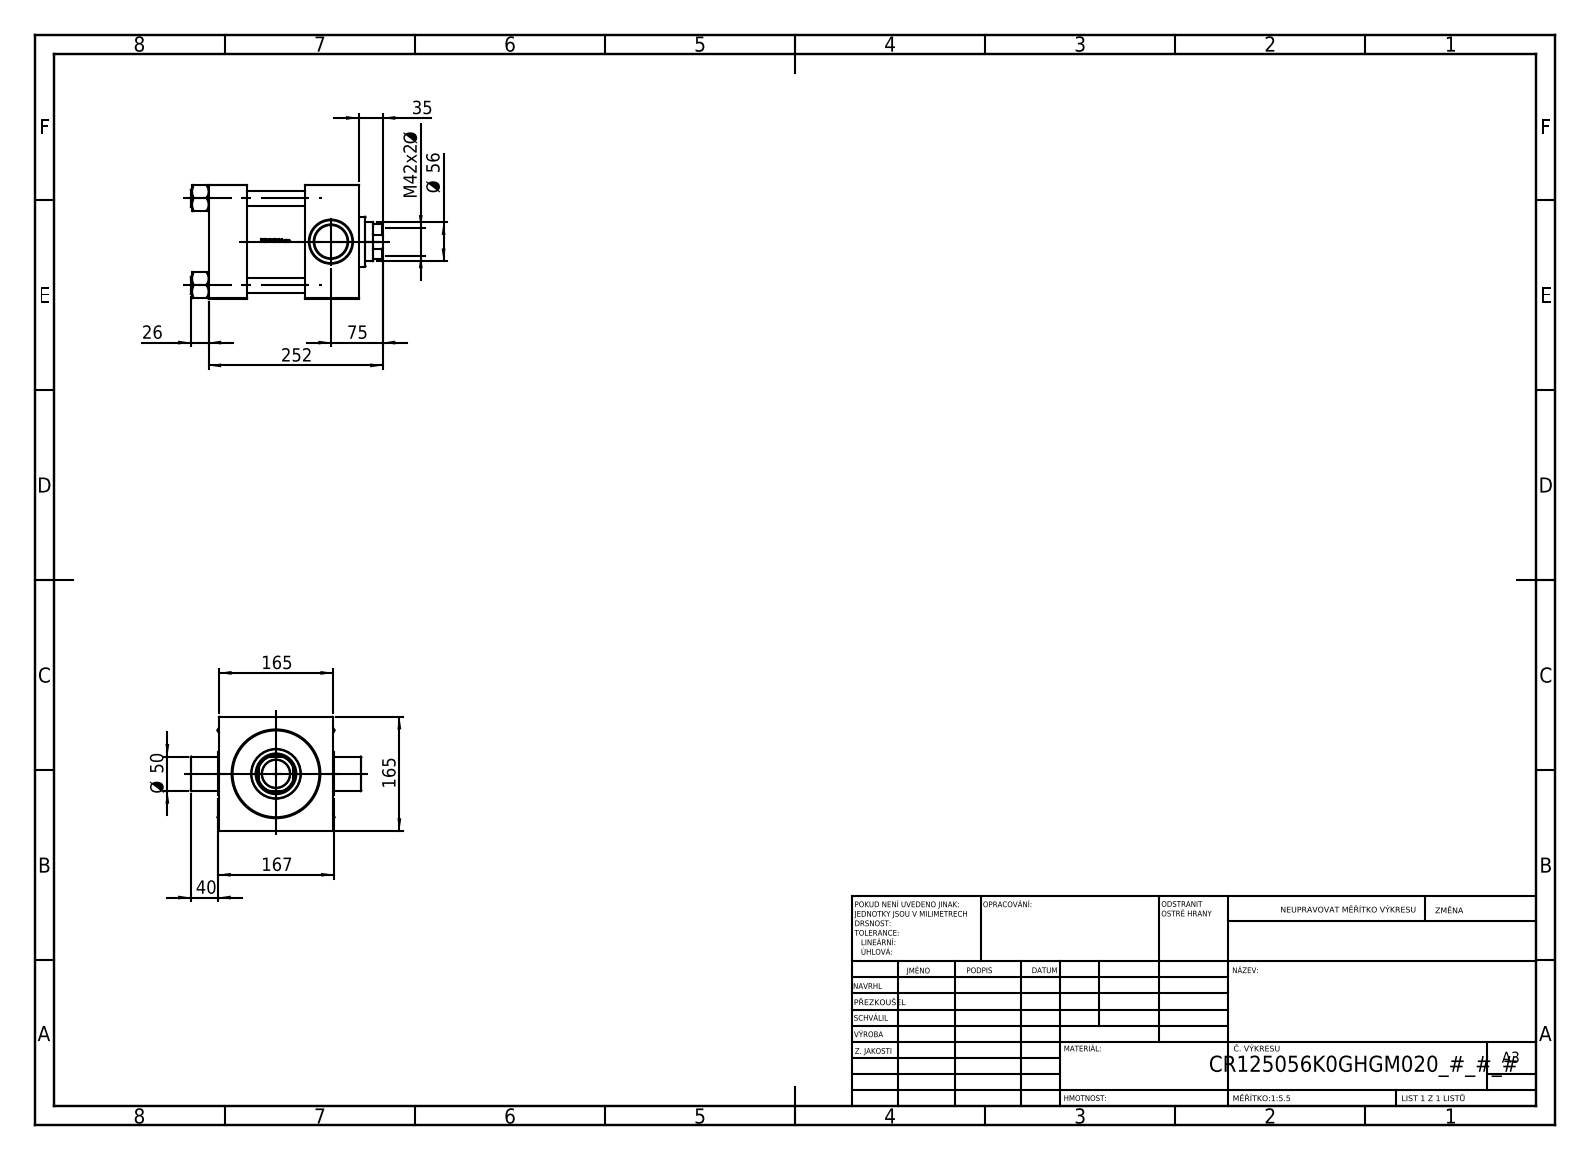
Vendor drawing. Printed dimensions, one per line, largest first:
252
167
165
165
75
Ø 56
Ø 50
M42x2 Ø
40
35
26
